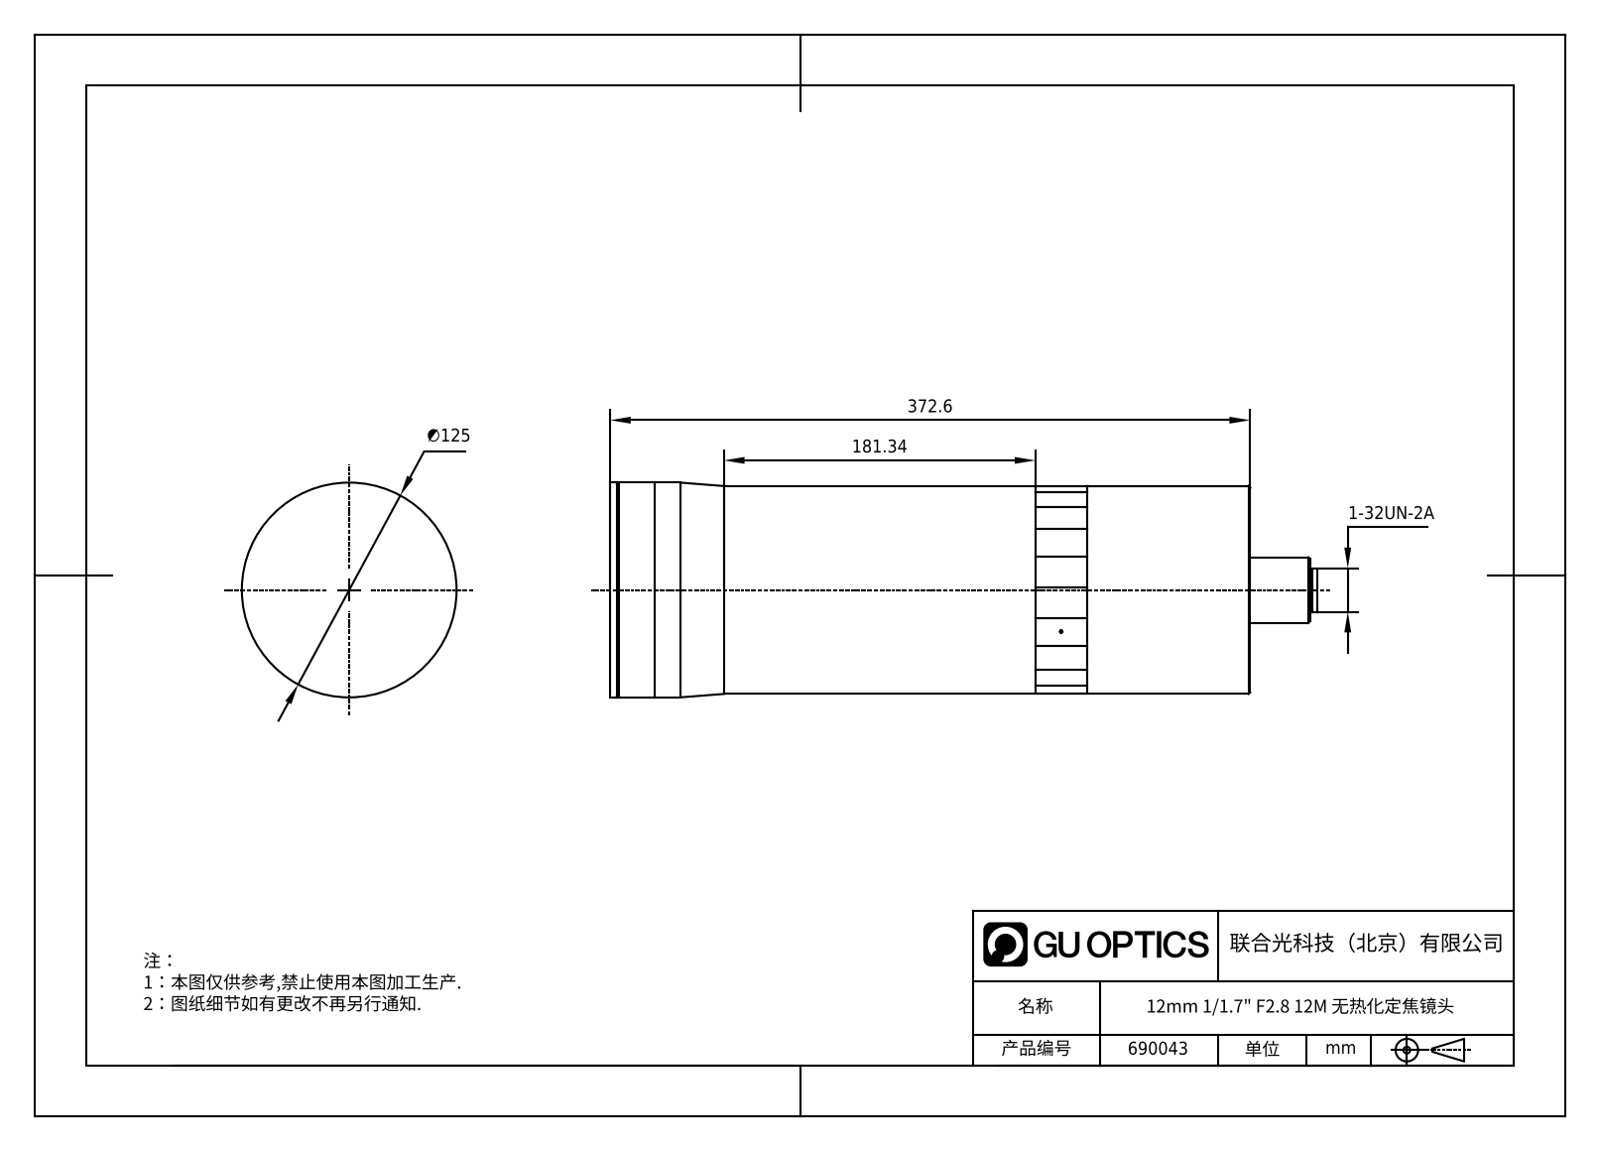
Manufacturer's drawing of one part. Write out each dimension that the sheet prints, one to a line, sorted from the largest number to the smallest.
372.6
181.34
∅125
1-32UN-2A
